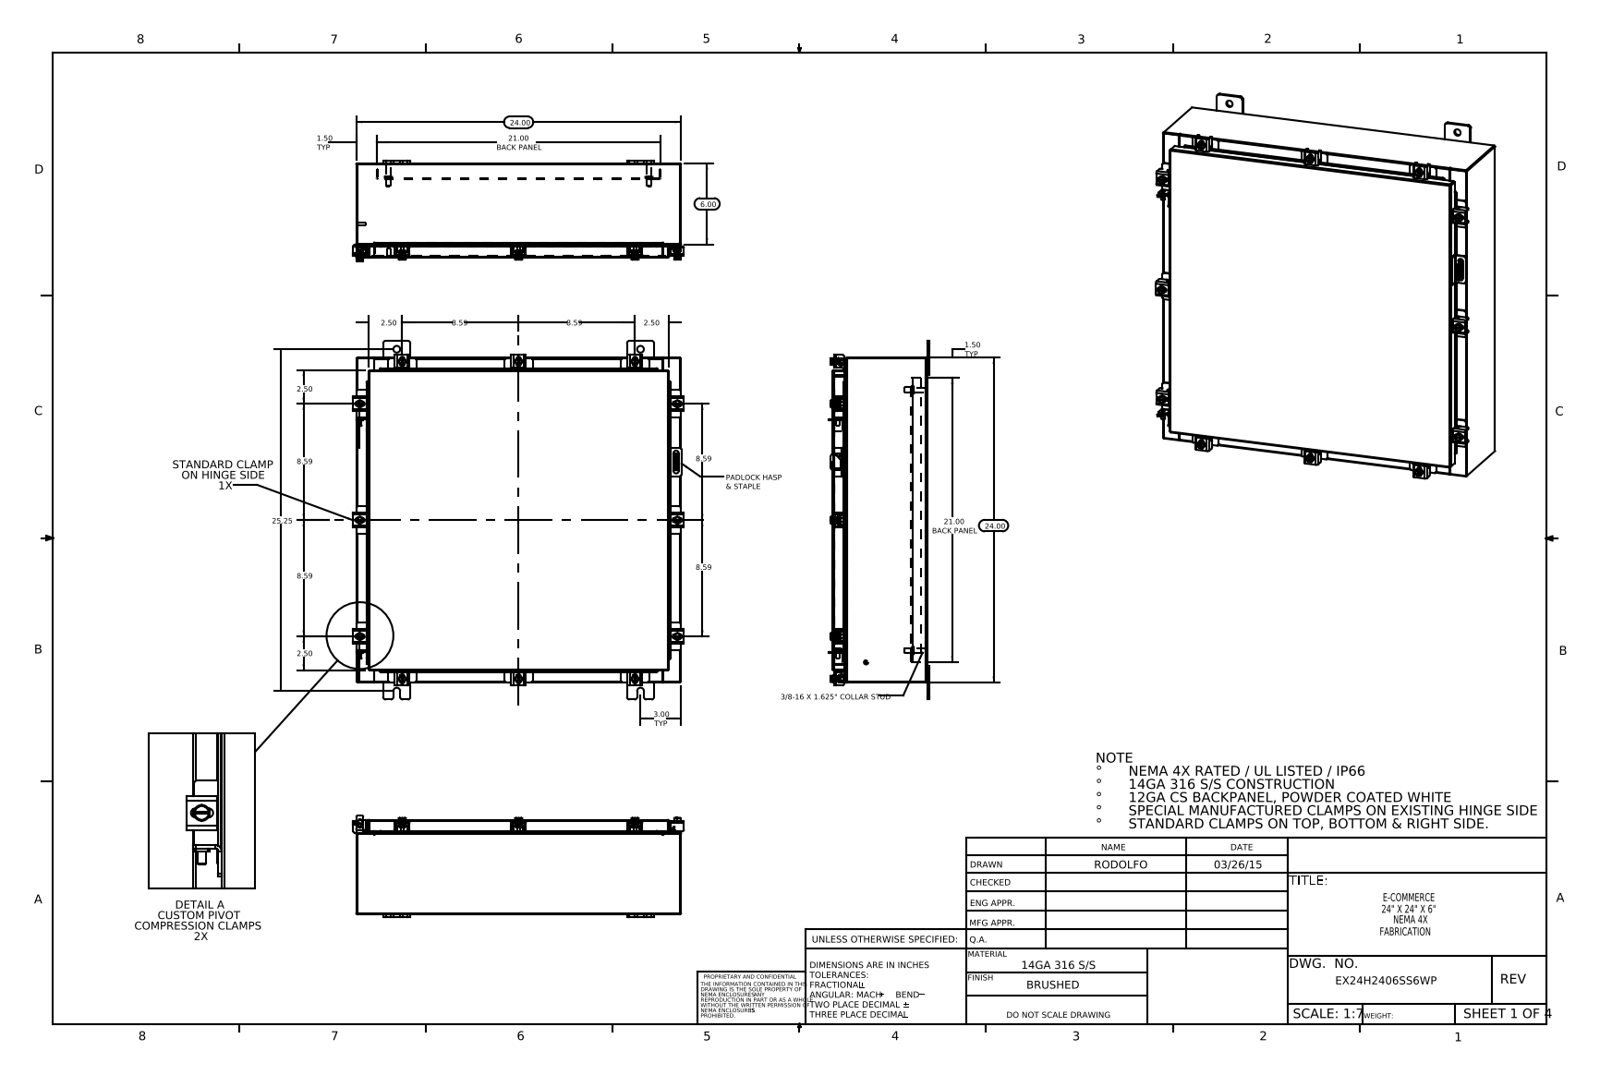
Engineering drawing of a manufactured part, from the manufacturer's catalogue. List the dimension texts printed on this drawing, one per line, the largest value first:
25.25
24.00
24.00
21.00 BACK PANEL
21.00 BACK PANEL
8.59
8.59
8.59
8.59
8.59
8.59
6.00
3.00 TYP
2.50
2.50
2.50
2.50
1.50 TYP
1.50 TYP
